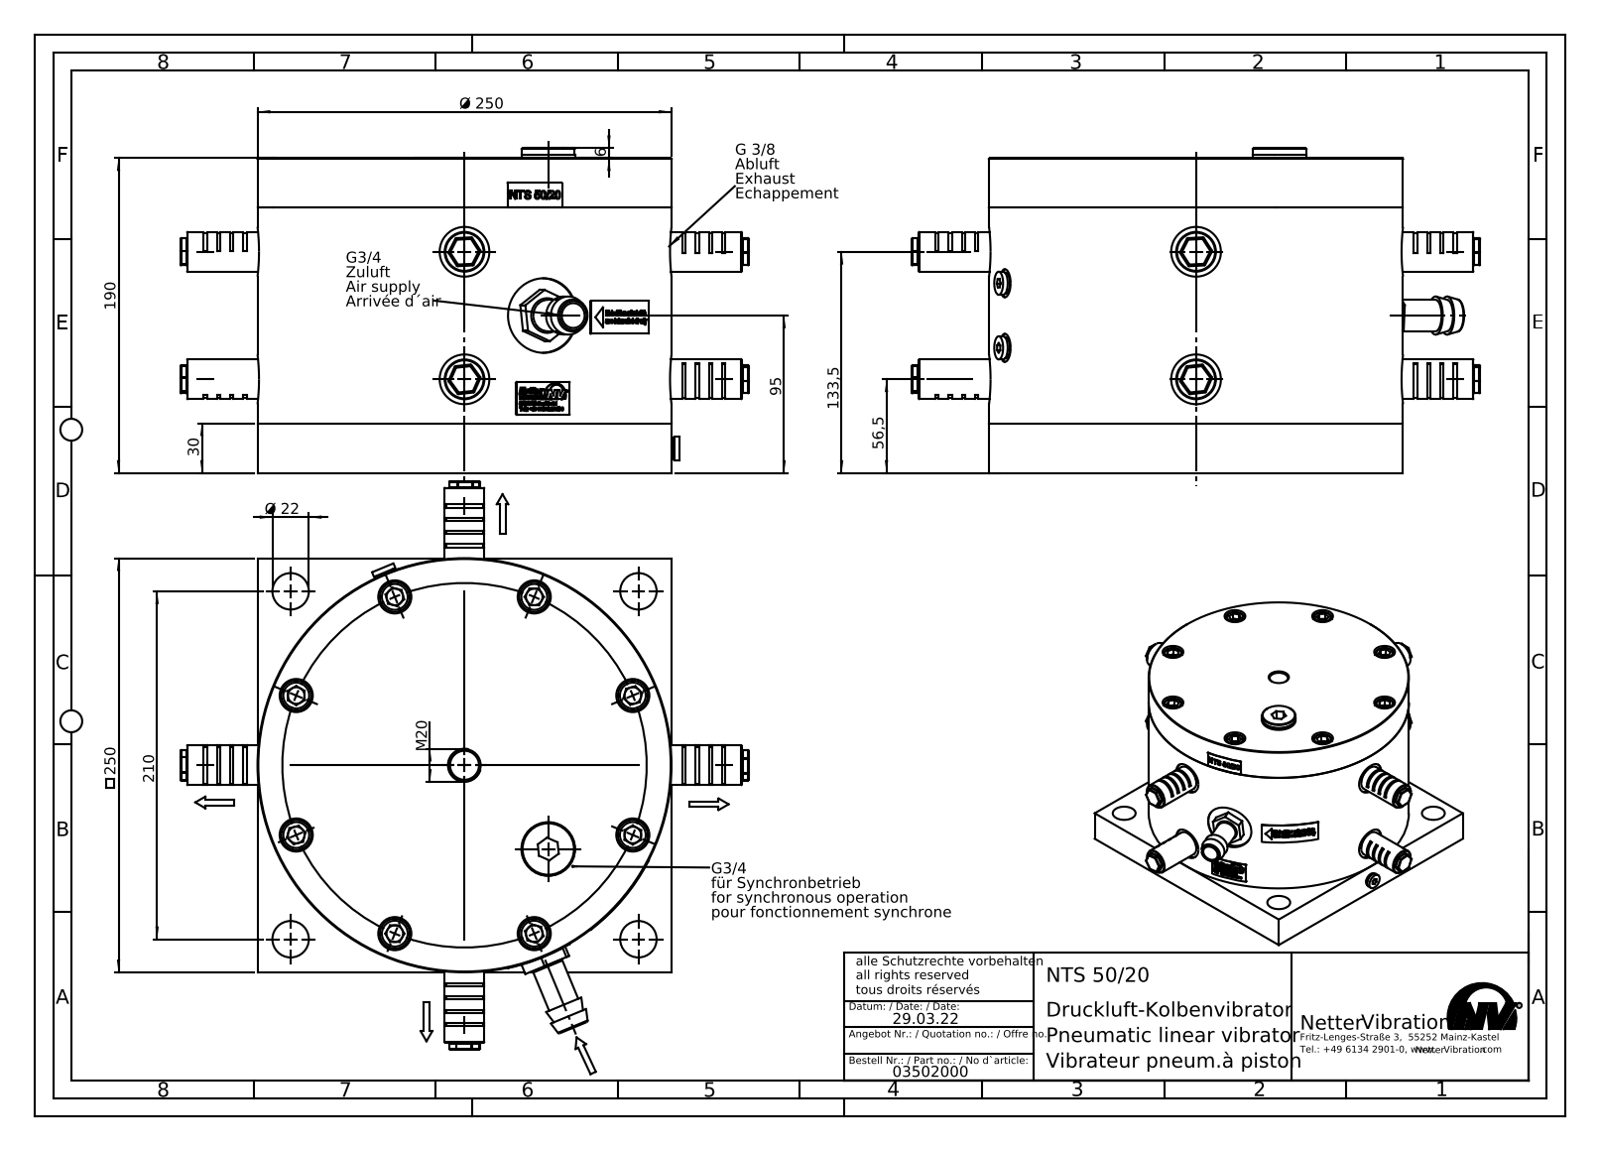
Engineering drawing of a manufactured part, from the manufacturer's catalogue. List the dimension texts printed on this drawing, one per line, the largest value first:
Ø 250
250
210
190
133,5
95
56,5
30
Ø 22
M 20
6
